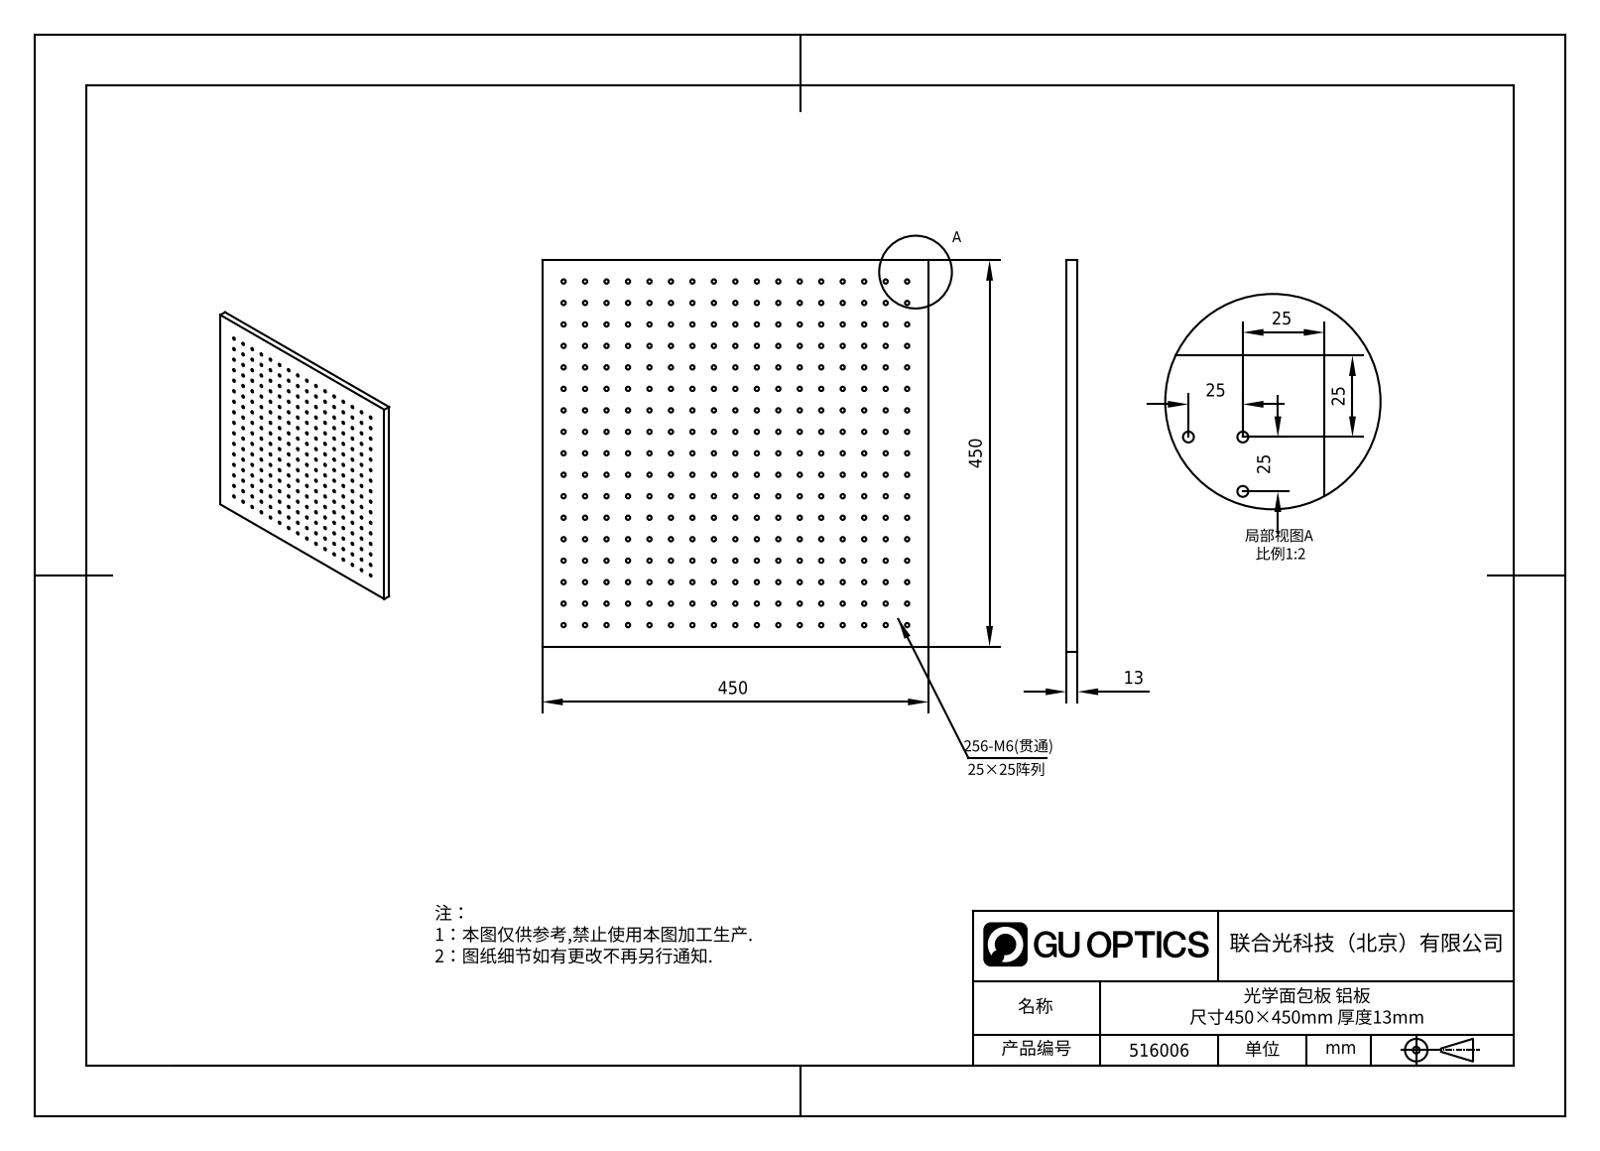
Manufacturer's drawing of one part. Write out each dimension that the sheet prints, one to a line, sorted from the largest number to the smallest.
450
450
25
25
25
25
13
